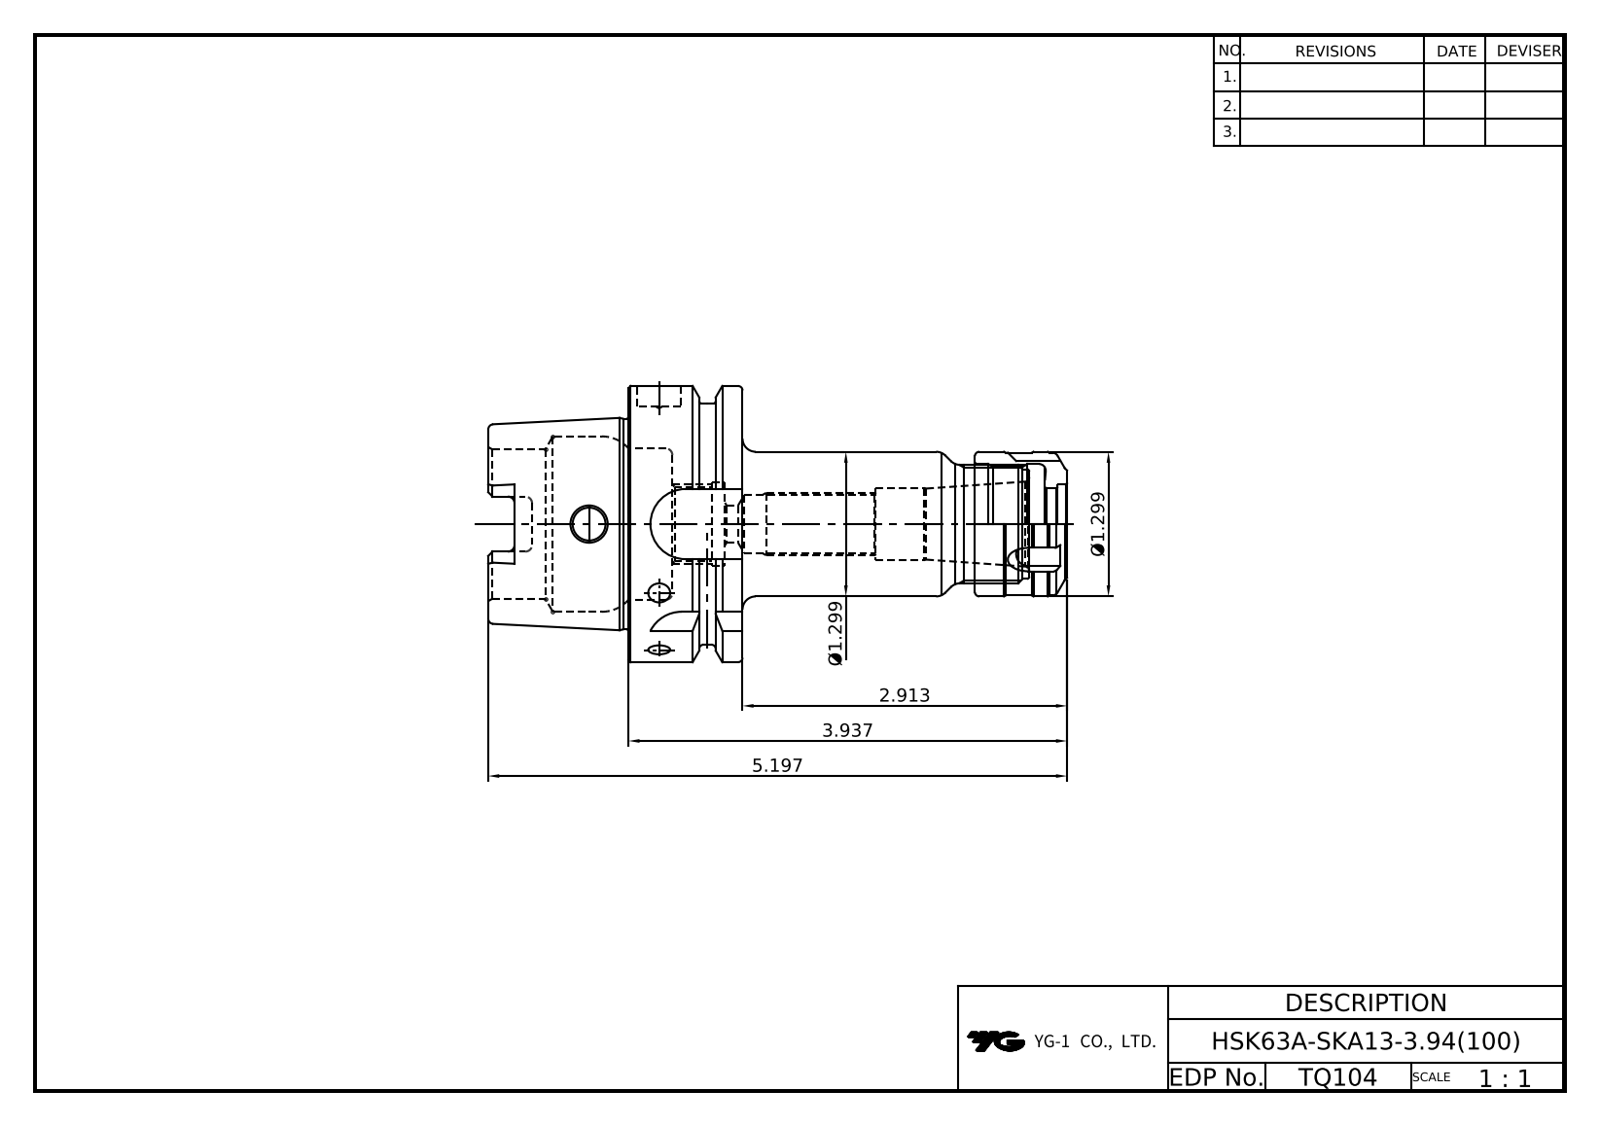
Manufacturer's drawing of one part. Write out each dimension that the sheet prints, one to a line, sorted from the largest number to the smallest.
5.197
3.937
2.913
Ø1.299
Ø1.299
